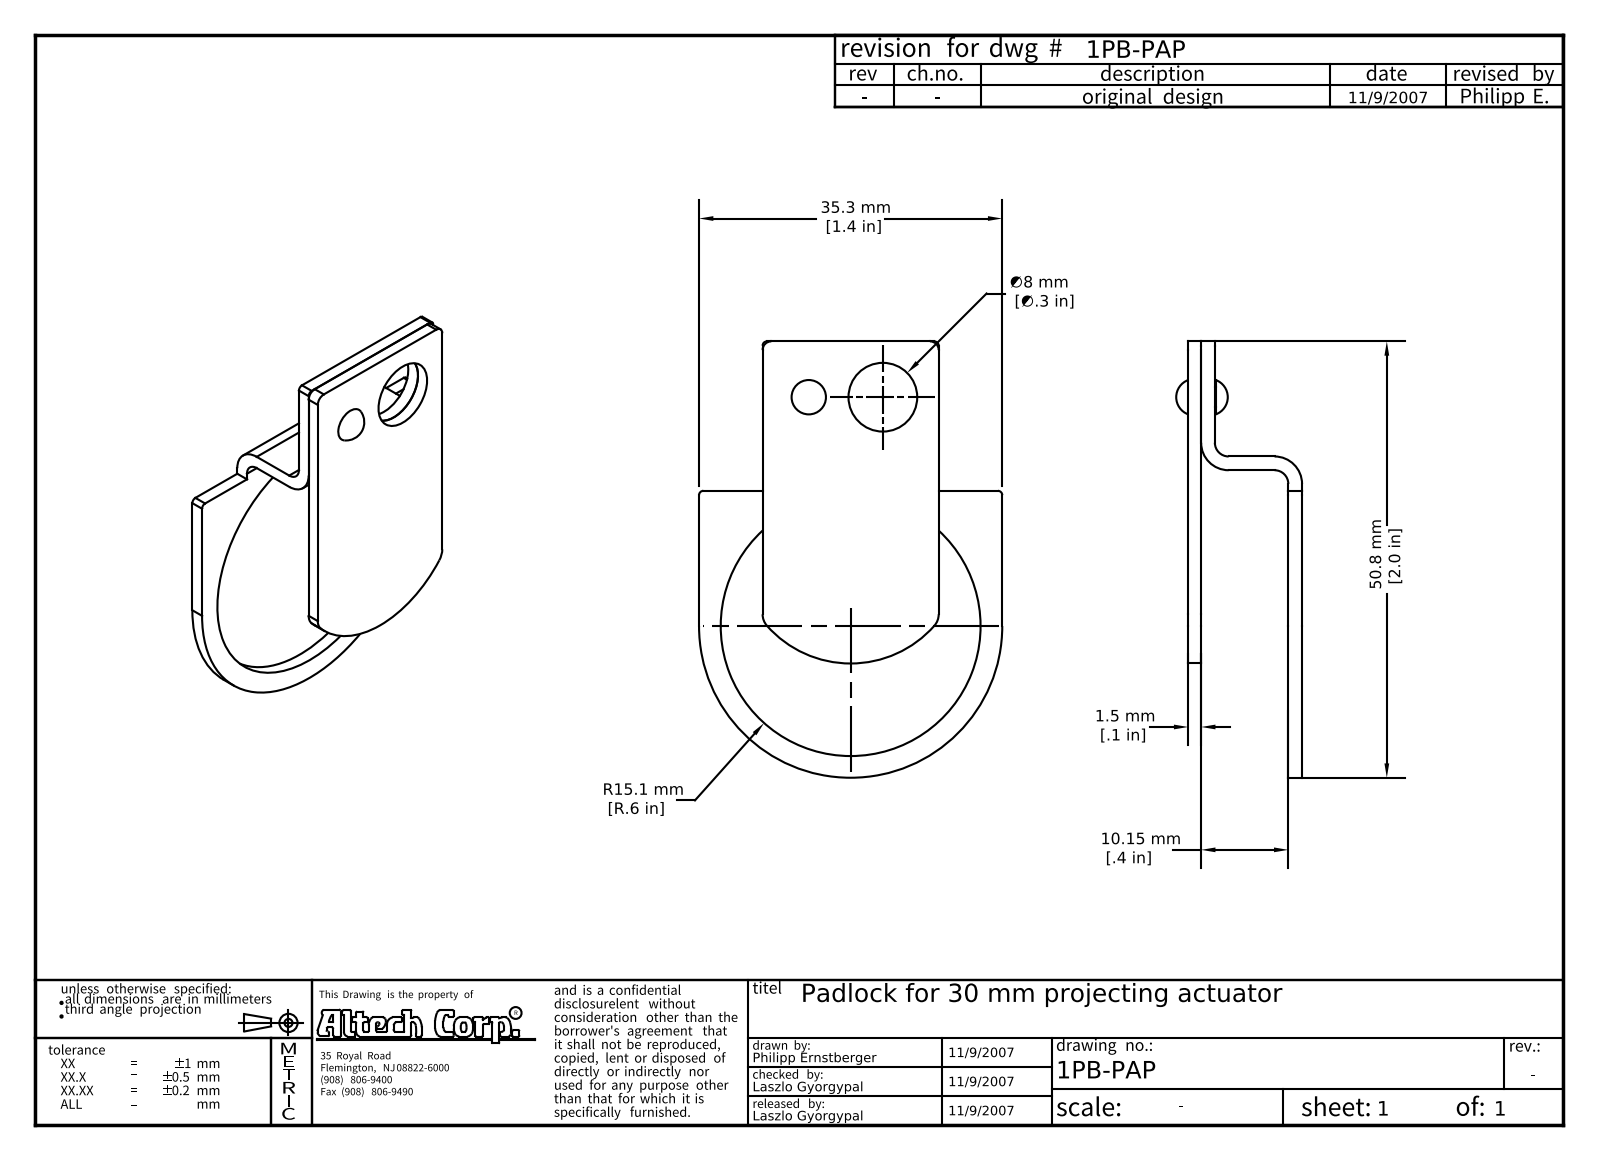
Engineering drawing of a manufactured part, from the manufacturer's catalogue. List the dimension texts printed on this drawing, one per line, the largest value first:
50.8 mm [2.0 in]
35.3 mm [1.4 in]
R15.1 mm [R.6 in]
10.15 mm [.4 in]
∅8 mm [∅.3 in]
1.5 mm [.1 in]
